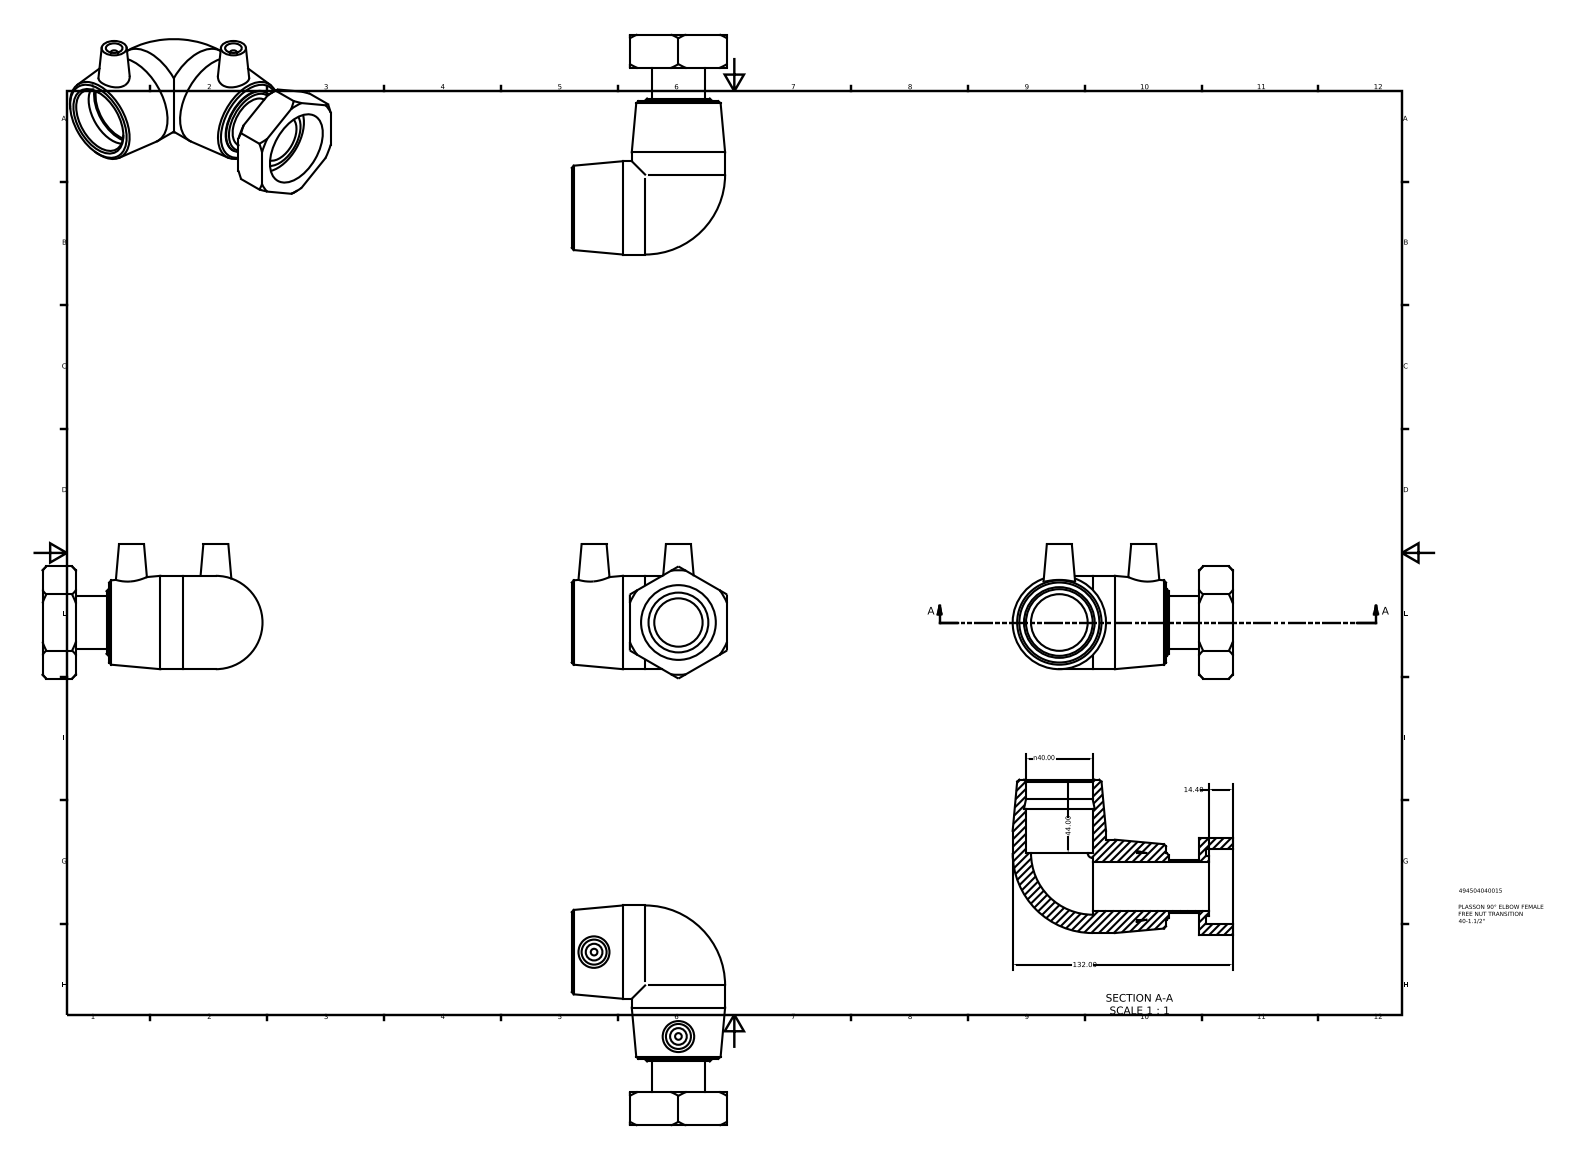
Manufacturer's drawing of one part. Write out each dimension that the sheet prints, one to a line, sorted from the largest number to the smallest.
132.00
44.00
n40.00
14.40
